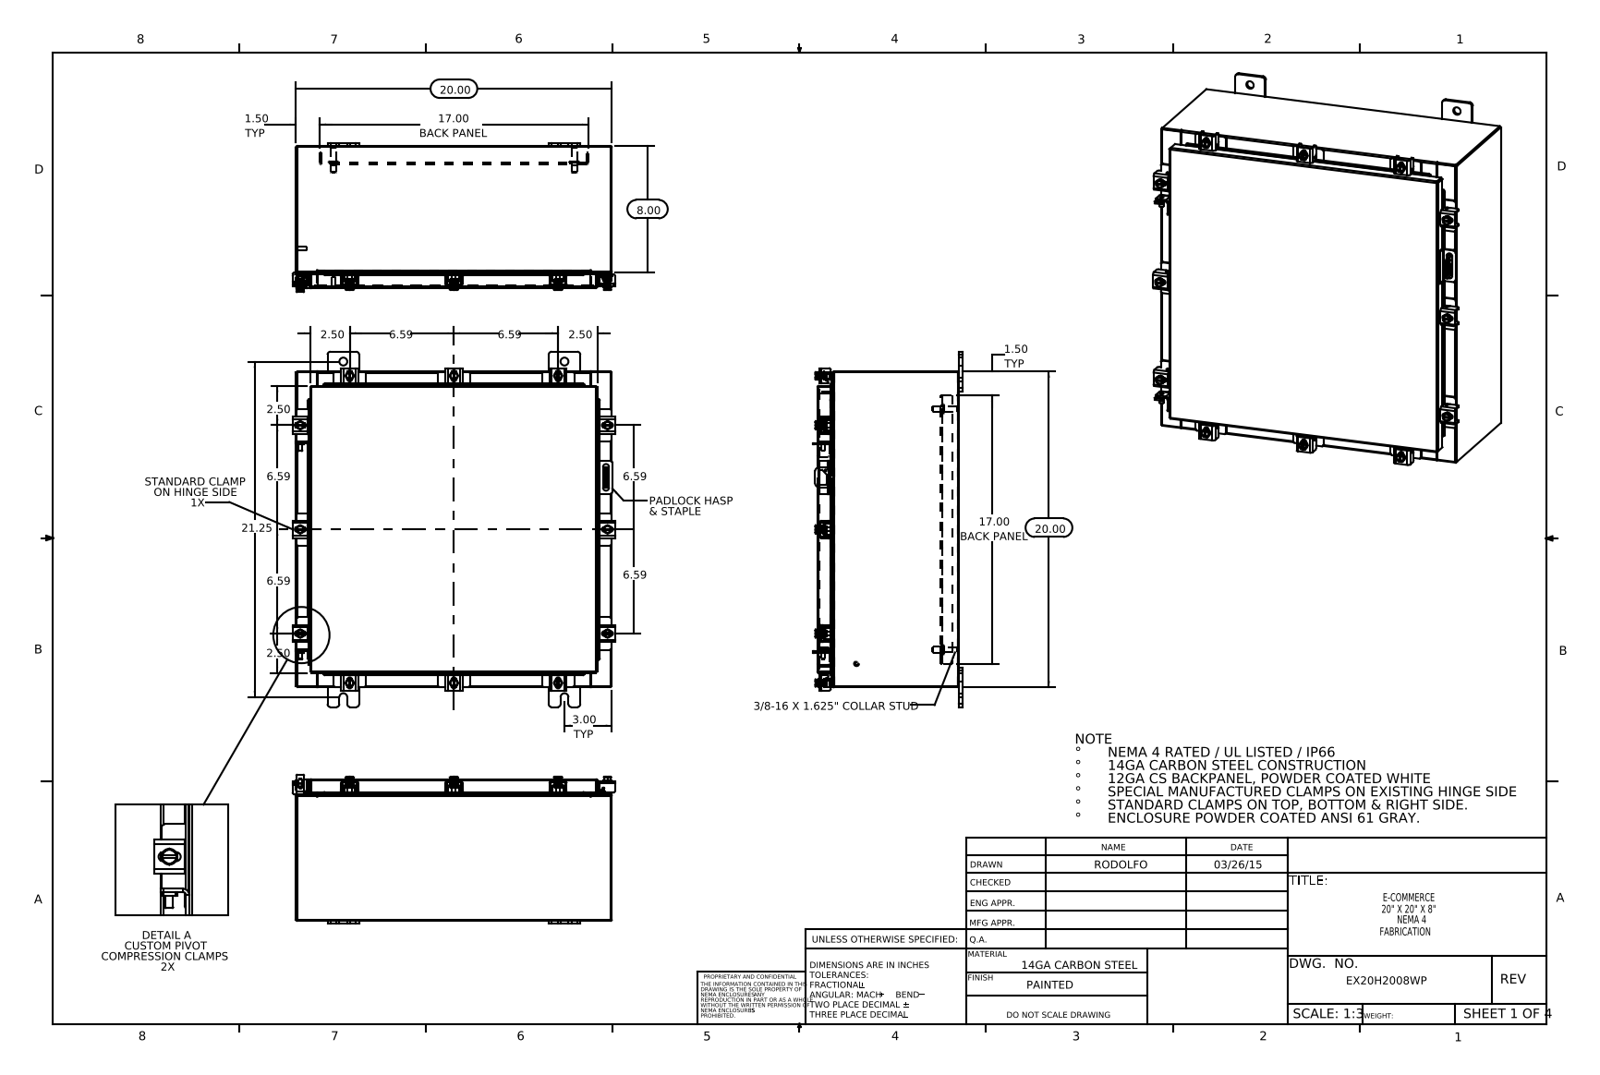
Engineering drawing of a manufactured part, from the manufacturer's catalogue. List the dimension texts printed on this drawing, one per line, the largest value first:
21.25
20.00
20.00
17.00 BACK PANEL
17.00 BACK PANEL
8.00
6.59
6.59
6.59
6.59
6.59
6.59
3.00 TYP
2.50
2.50
2.50
2.50
1.50 TYP
1.50 TYP
